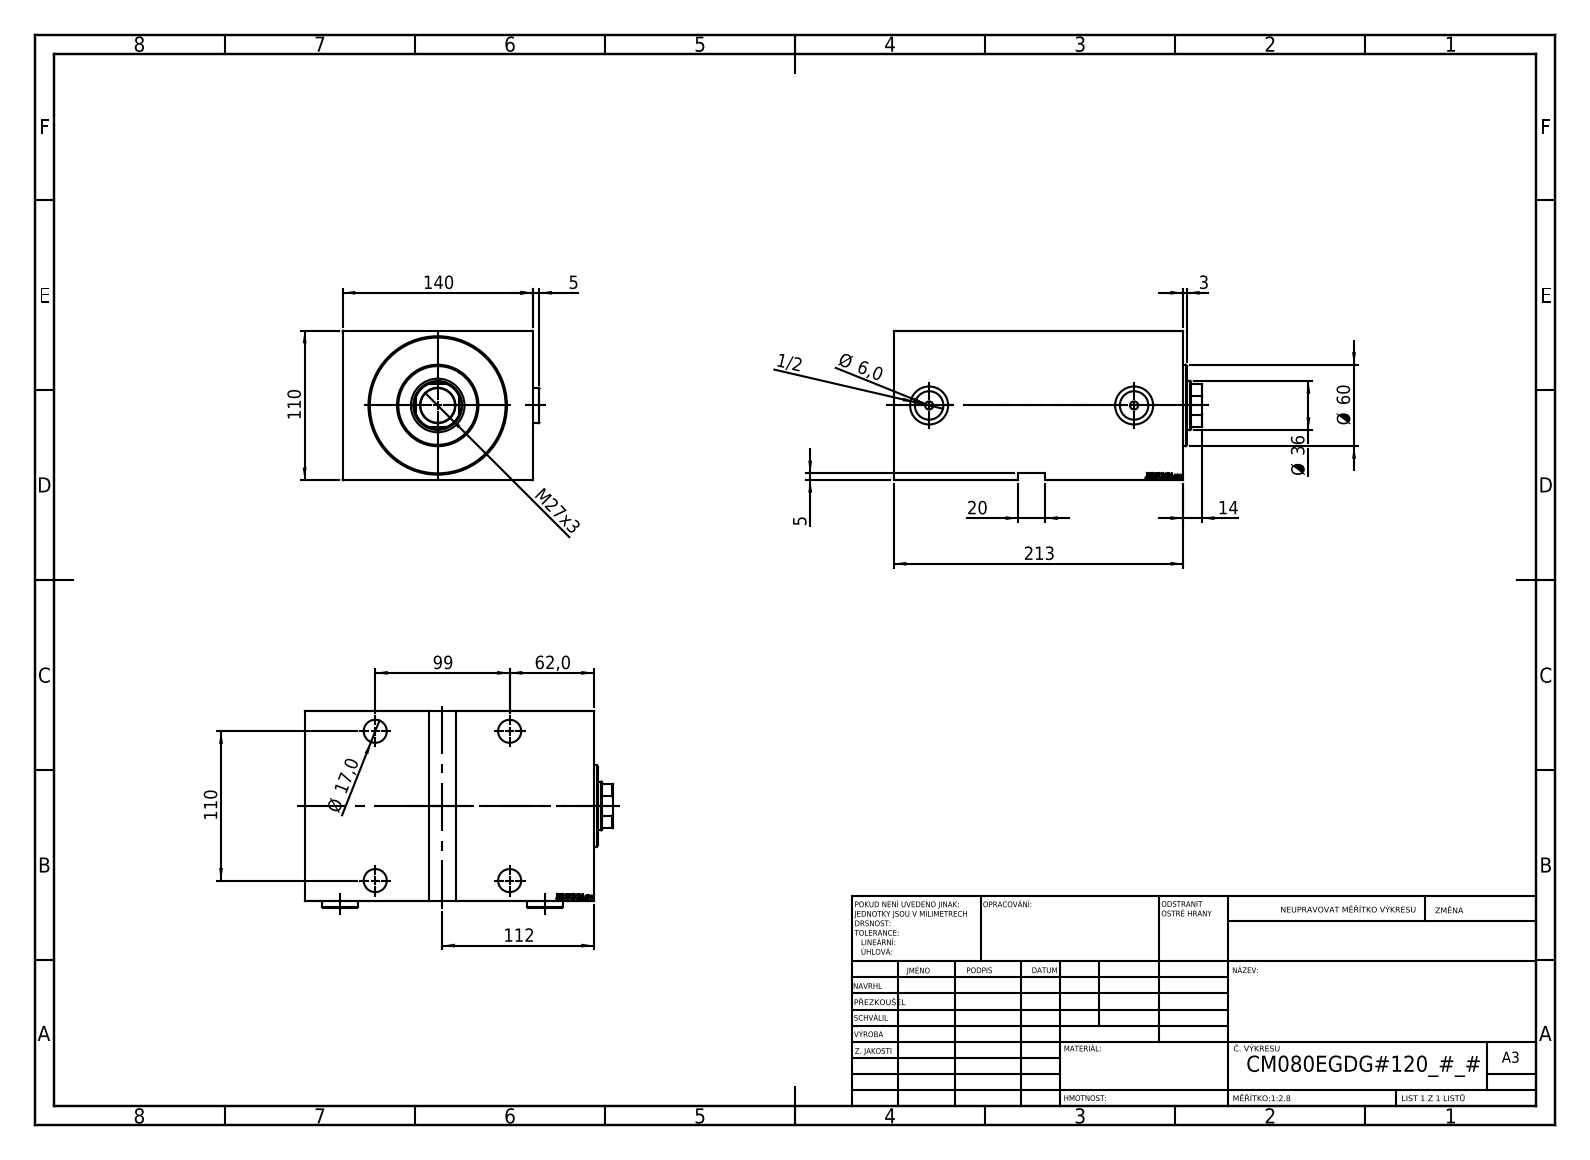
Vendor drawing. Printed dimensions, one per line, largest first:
213
140
112
110
110
99
62,0
Ø 60
Ø 36
M27x3
20
Ø 17,0
14
Ø 6,0
5
5
3
1/2
